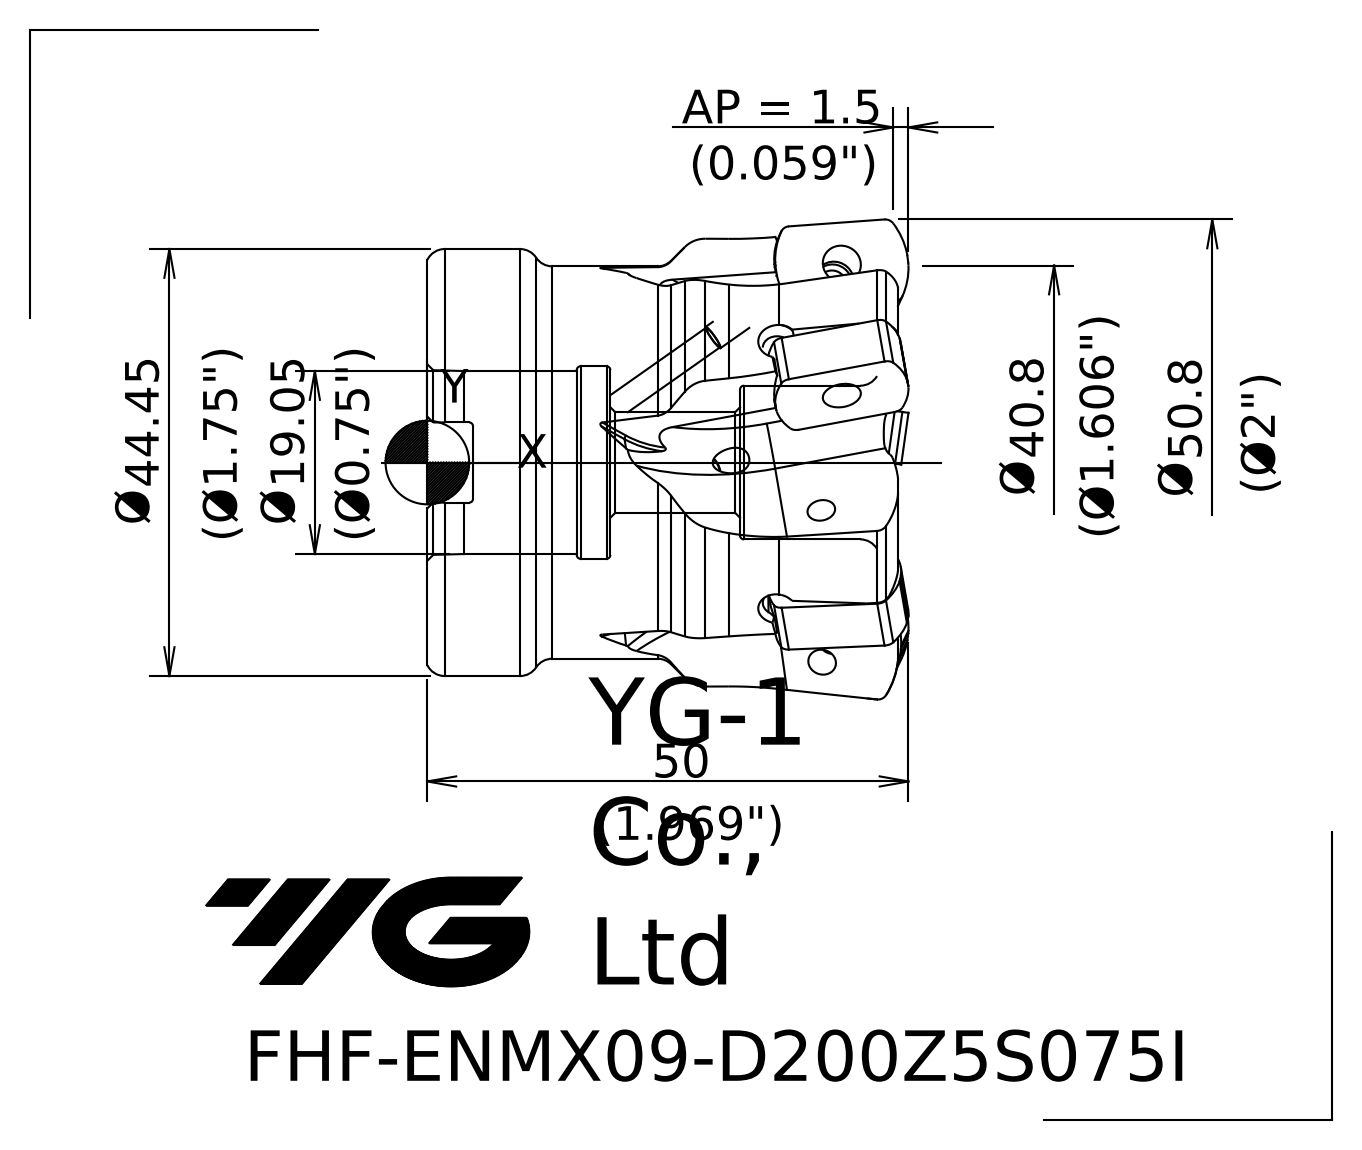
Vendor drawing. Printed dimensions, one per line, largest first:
50.8 Ø
40.8 Ø
19.05 Ø
AP = 1.5
